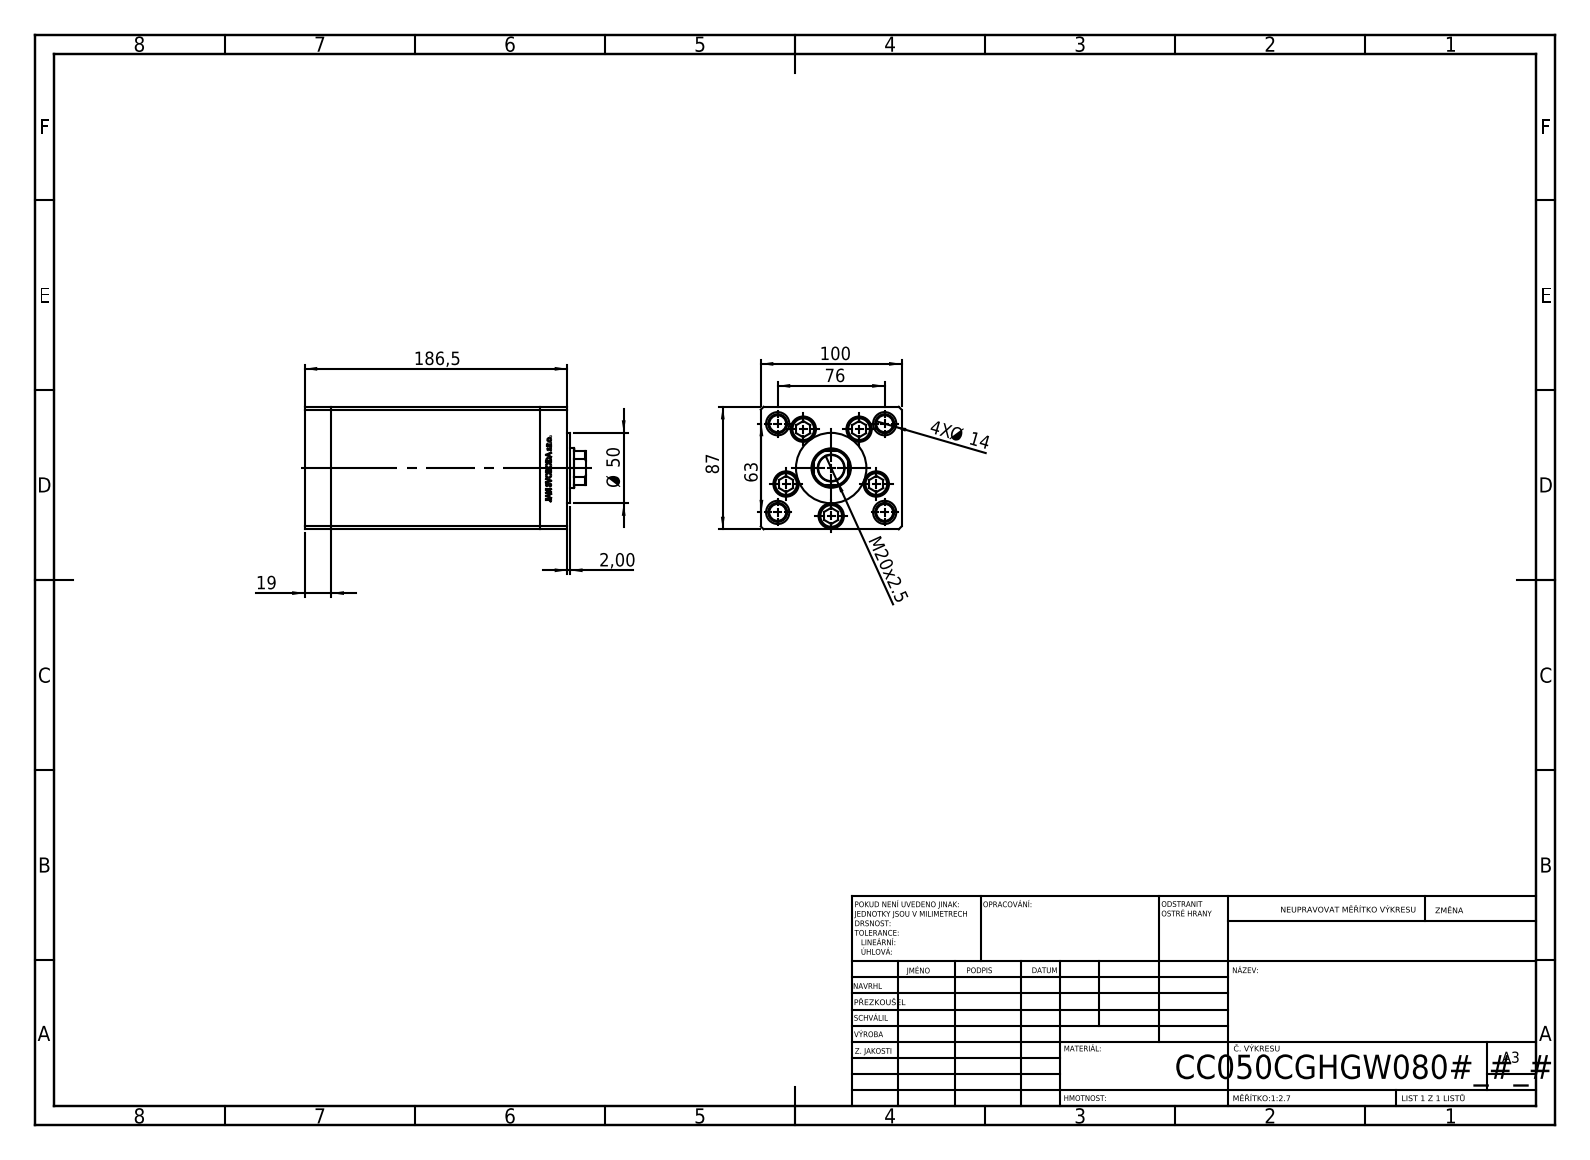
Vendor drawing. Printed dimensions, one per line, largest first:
186,5
100
87
76
63
Ø 50
M20x2.5
19
4X Ø 14
2,00
